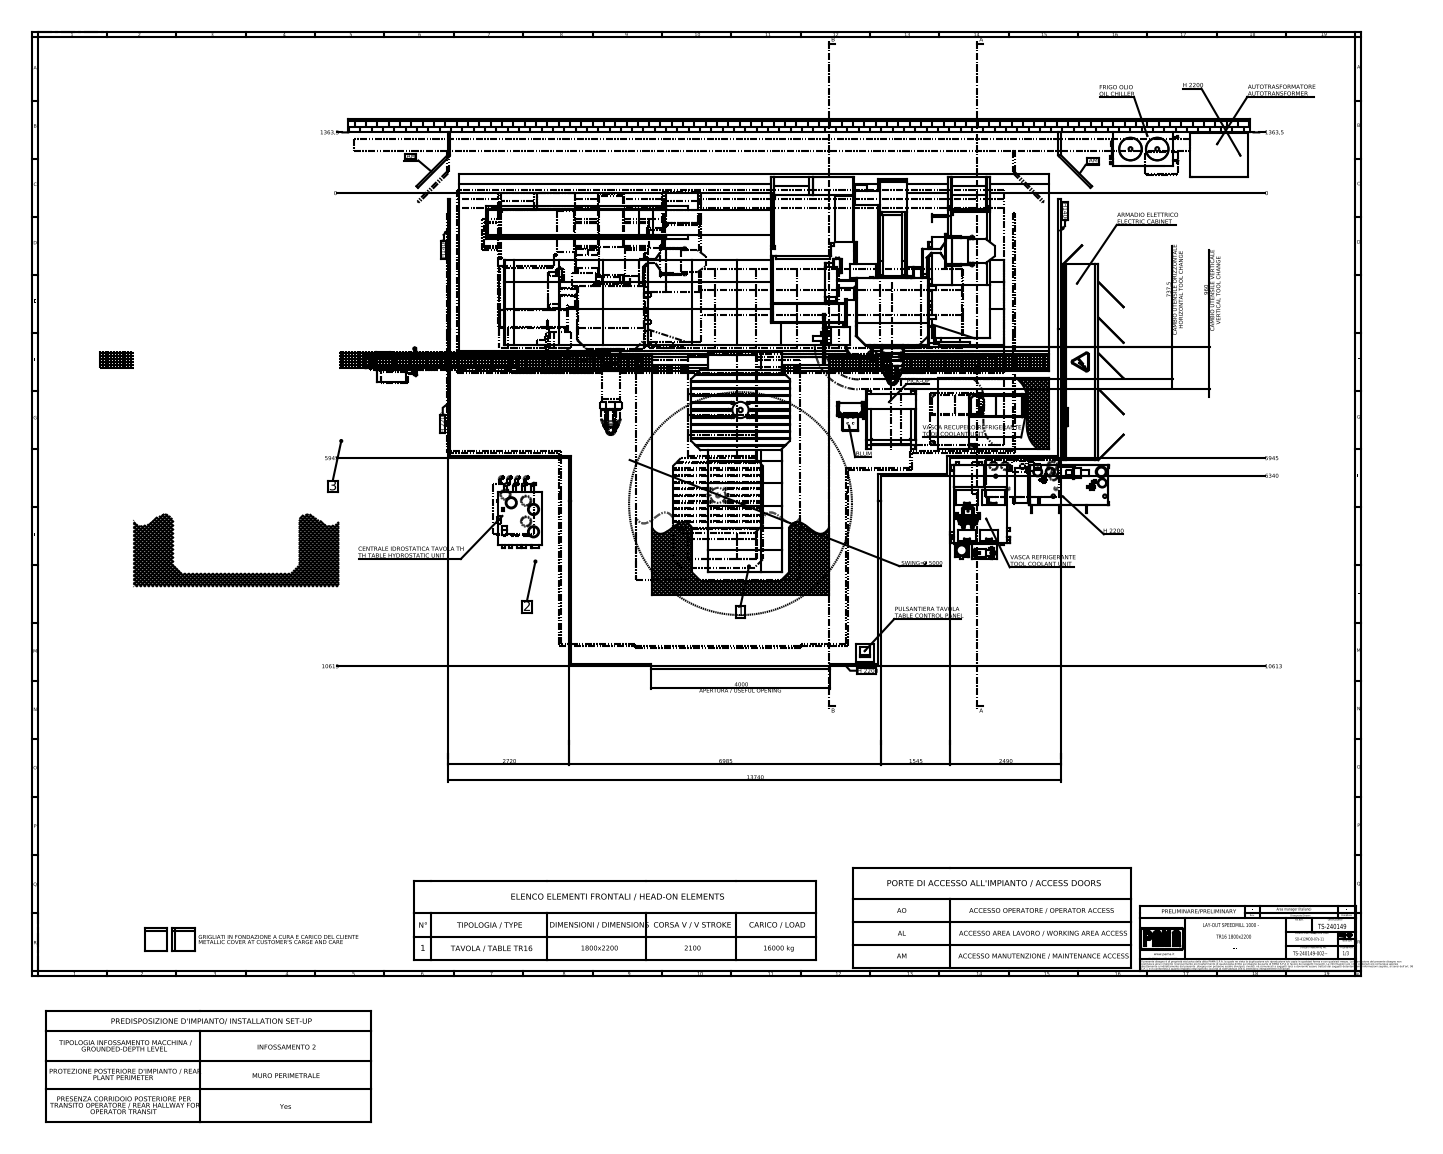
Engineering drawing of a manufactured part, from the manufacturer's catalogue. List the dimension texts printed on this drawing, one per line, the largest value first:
13740
10613
10613
6985
6340
5945
5945
SWING= Ø 5000
4000 APERTURA / USEFUL OPENING
2720
2490
1545
1363,5
1363,5
960 CAMBIO UTENSILE VERTICALE VERTICAL TOOL CHANGE
737,5 CAMBIO UTENSILE ORIZZONTALE HORIZONTAL TOOL CHANGE
30
0
0
